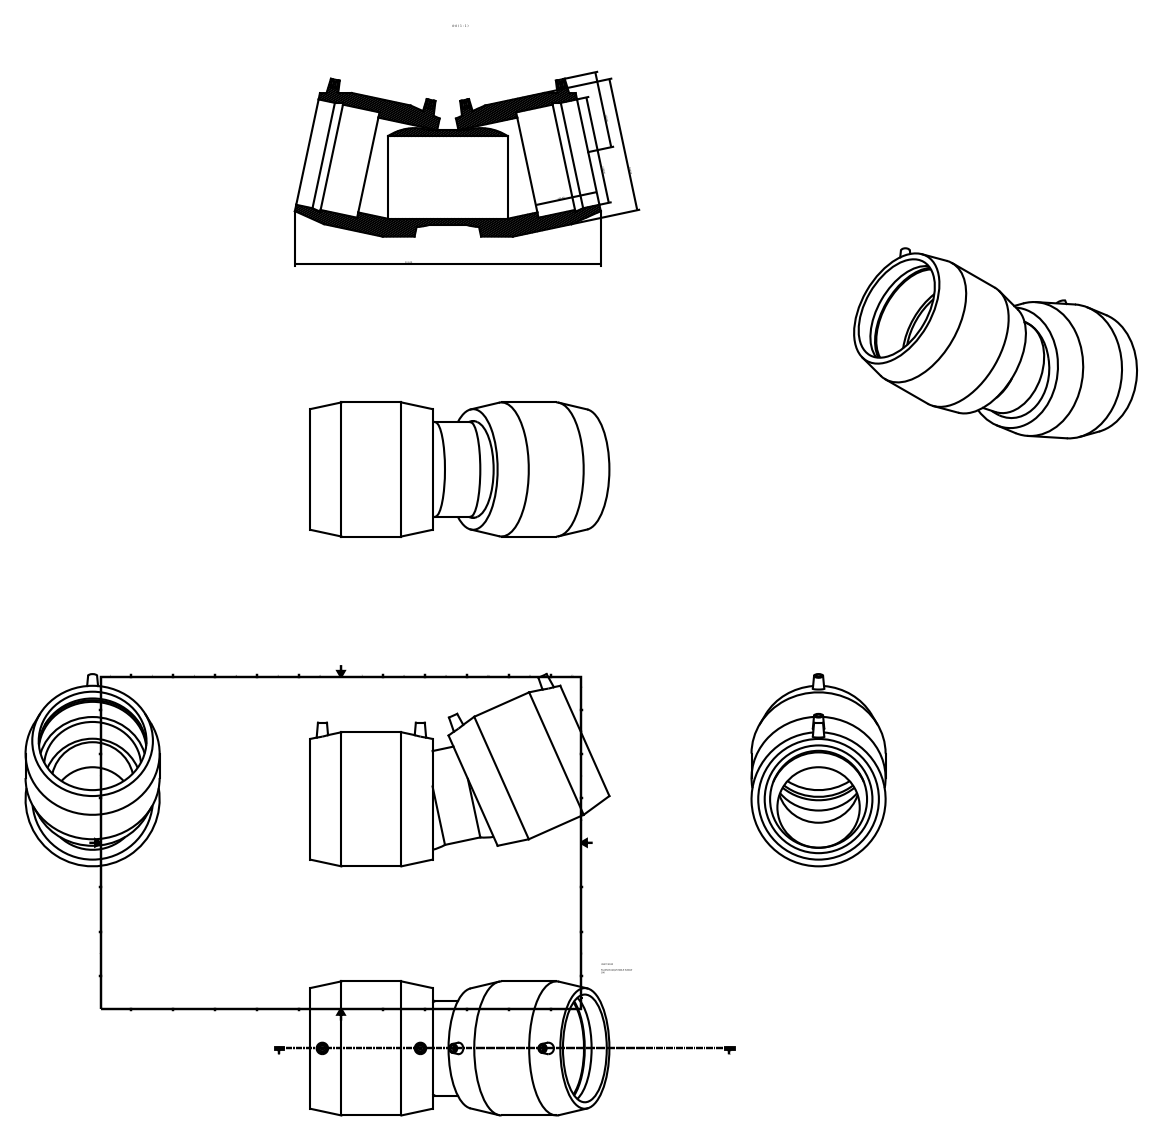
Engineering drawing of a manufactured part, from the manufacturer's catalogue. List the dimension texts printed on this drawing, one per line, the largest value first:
511,00
224,00
n180,00
128,00
104,00
